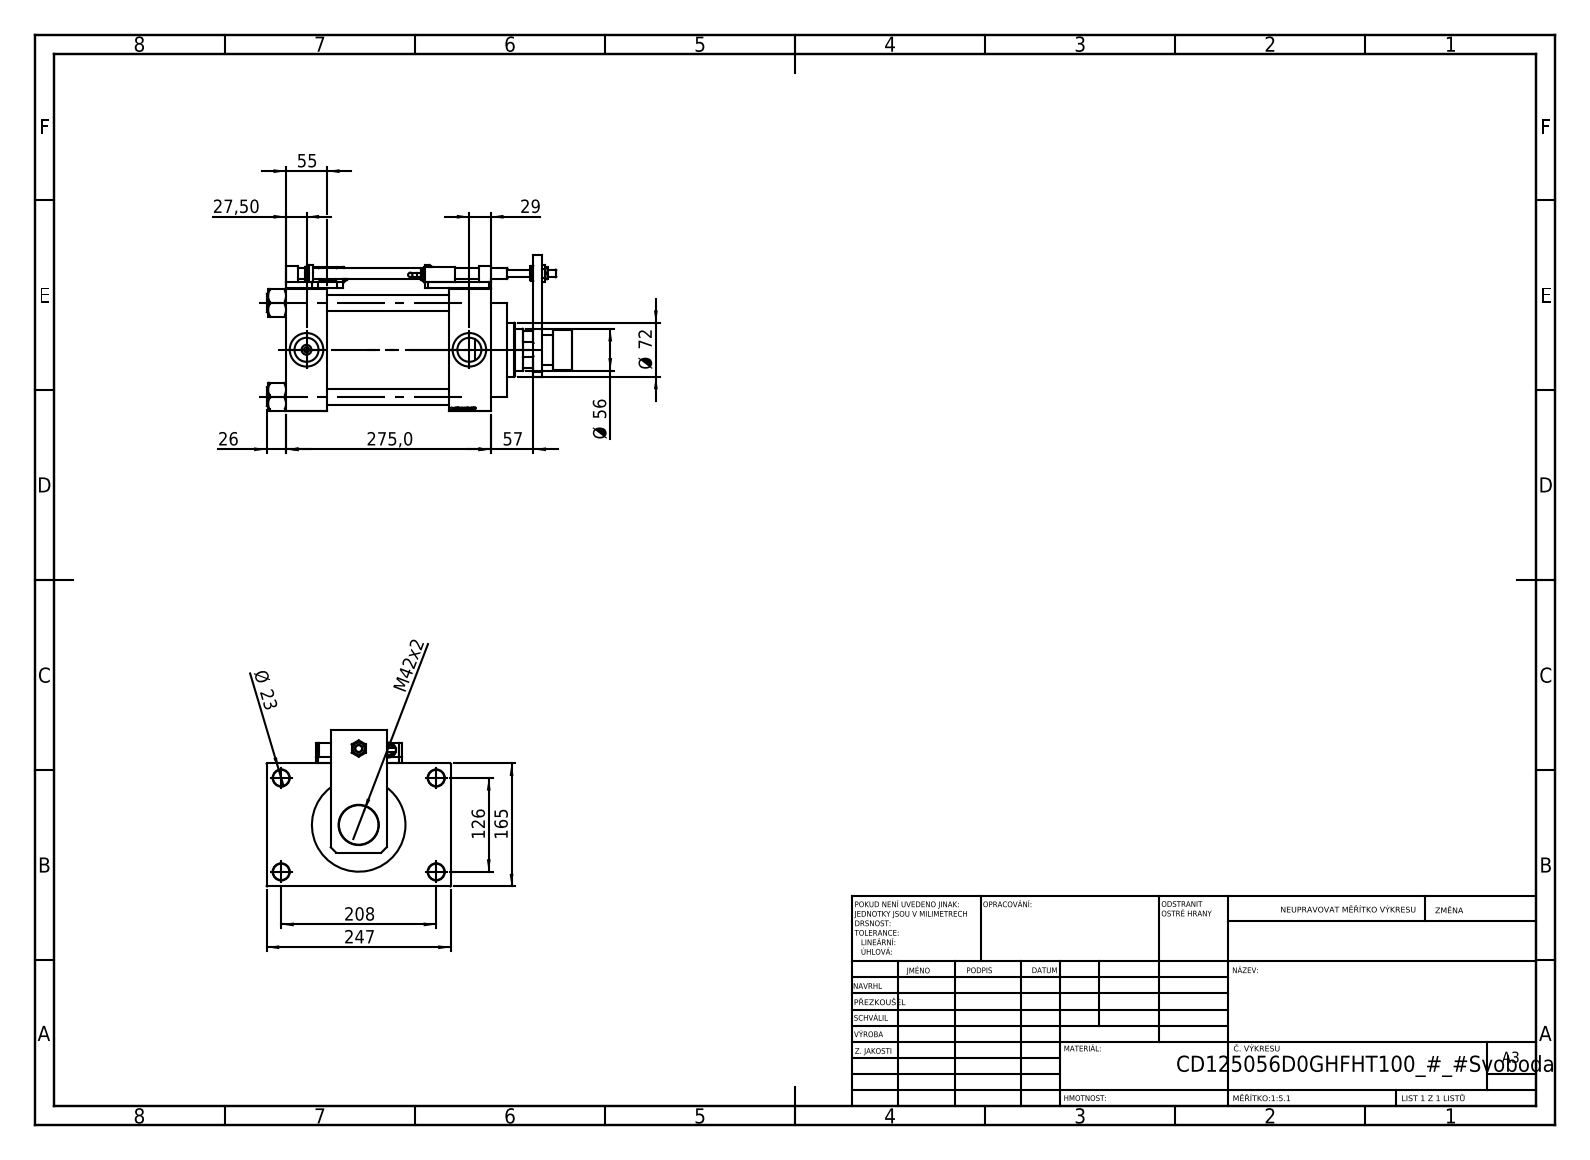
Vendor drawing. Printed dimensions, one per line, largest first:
275,0
247
208
165
126
Ø 72
57
Ø 56
55
M42x2
29
27,50
26
Ø 23
